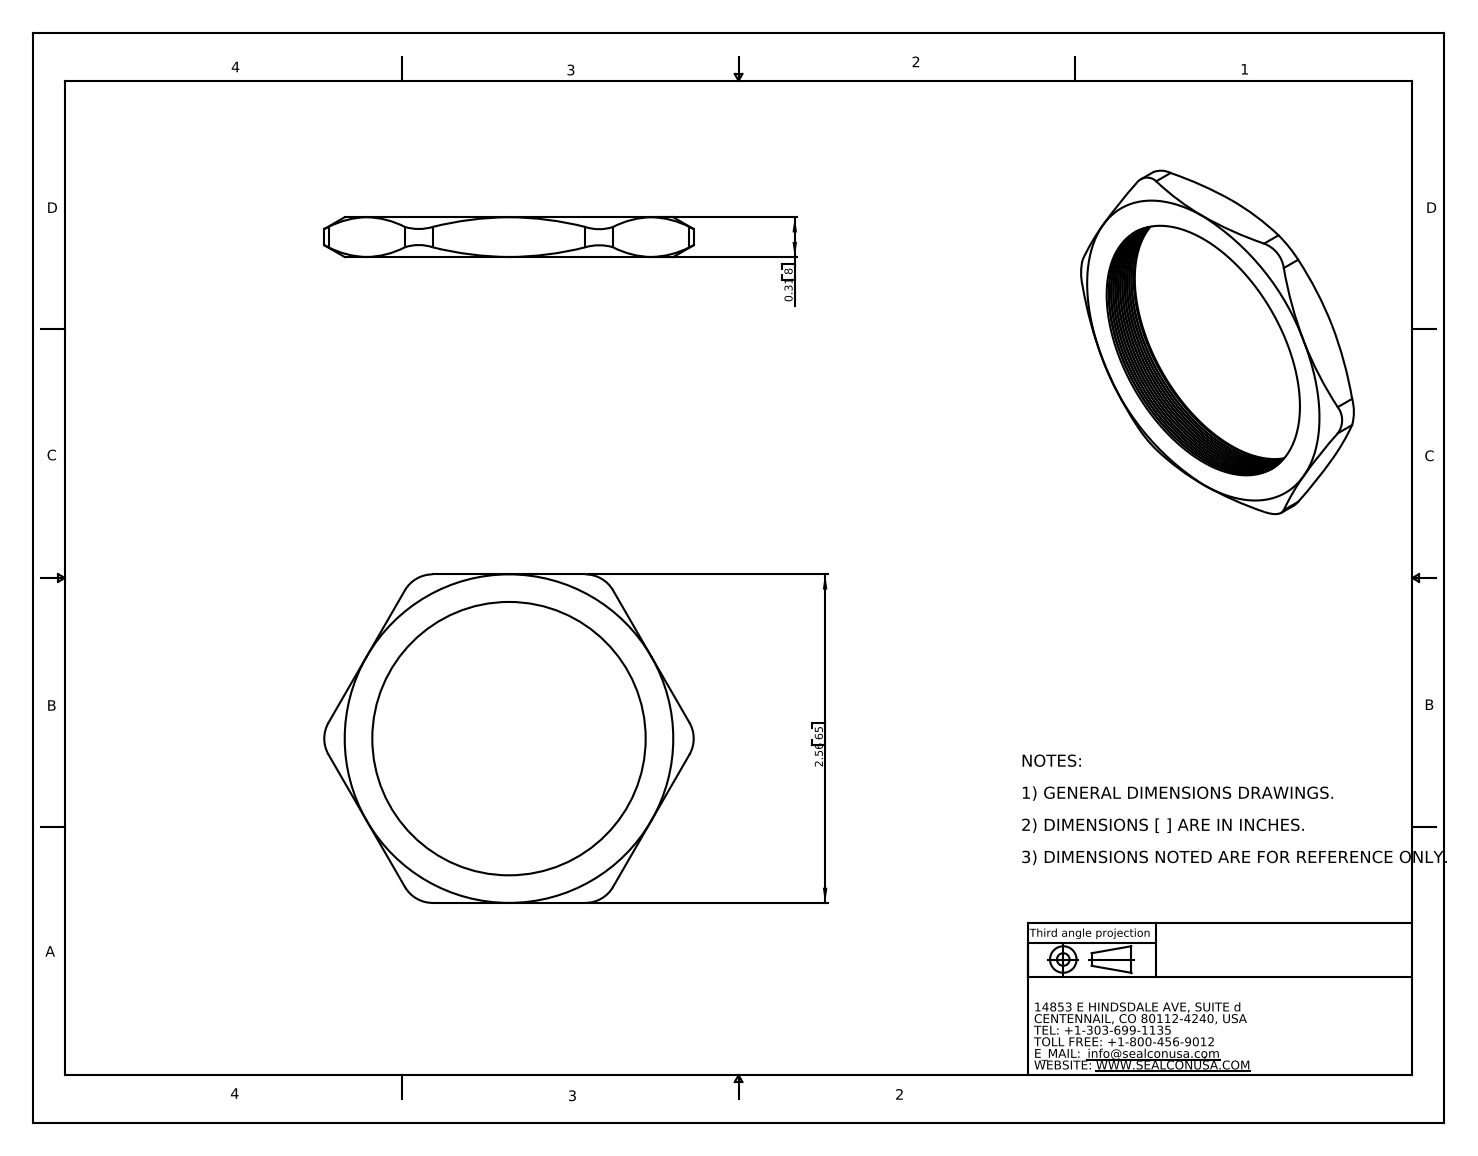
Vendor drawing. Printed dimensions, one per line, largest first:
2.56 65
0.31 8
